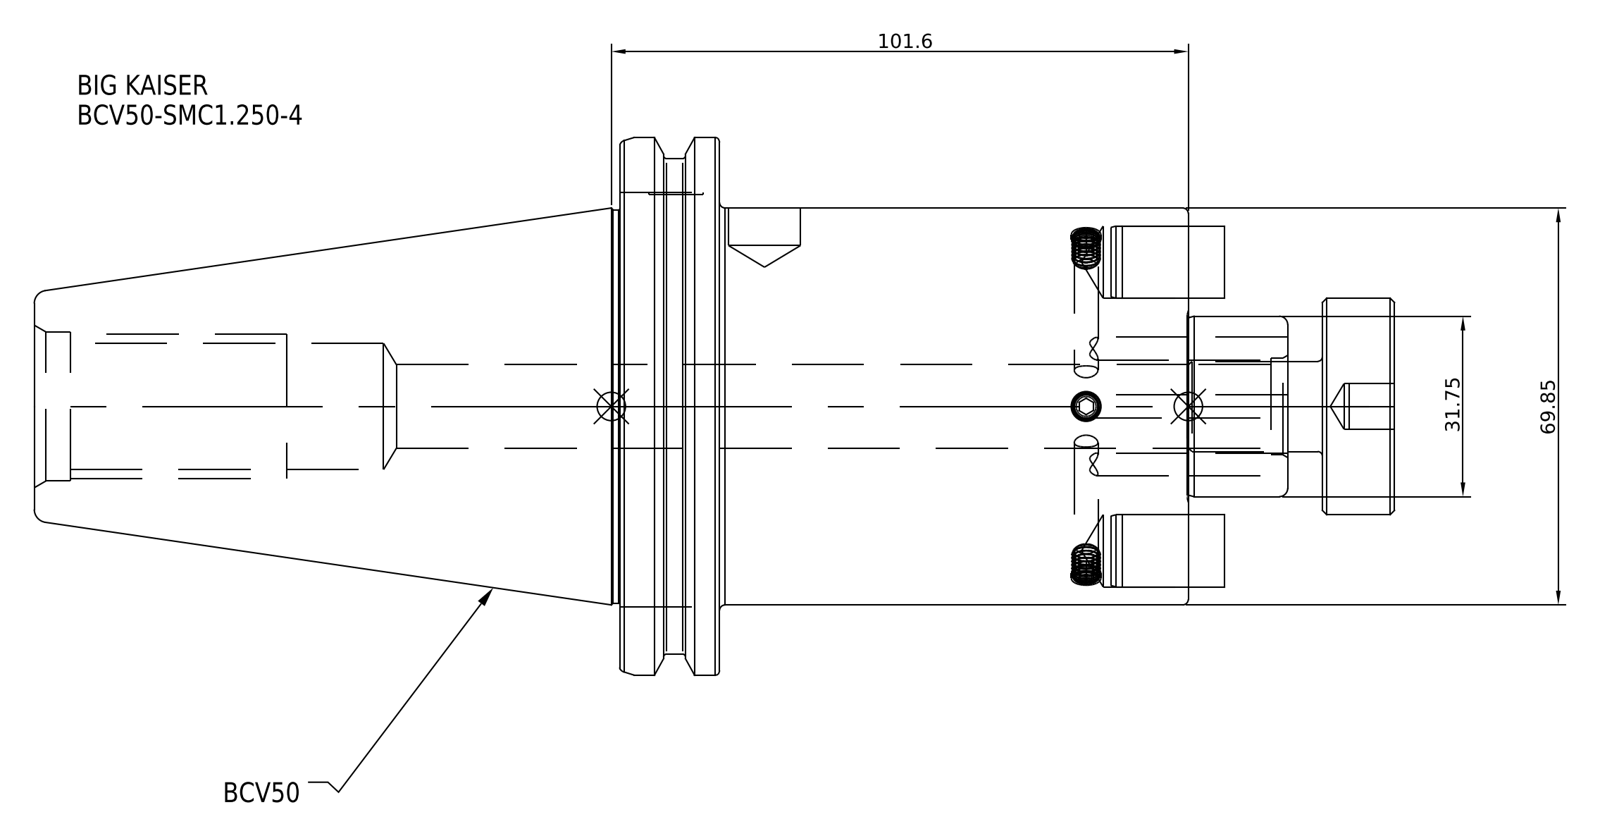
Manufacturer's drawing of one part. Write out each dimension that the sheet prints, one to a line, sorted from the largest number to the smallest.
101.6
69.85
31.75
